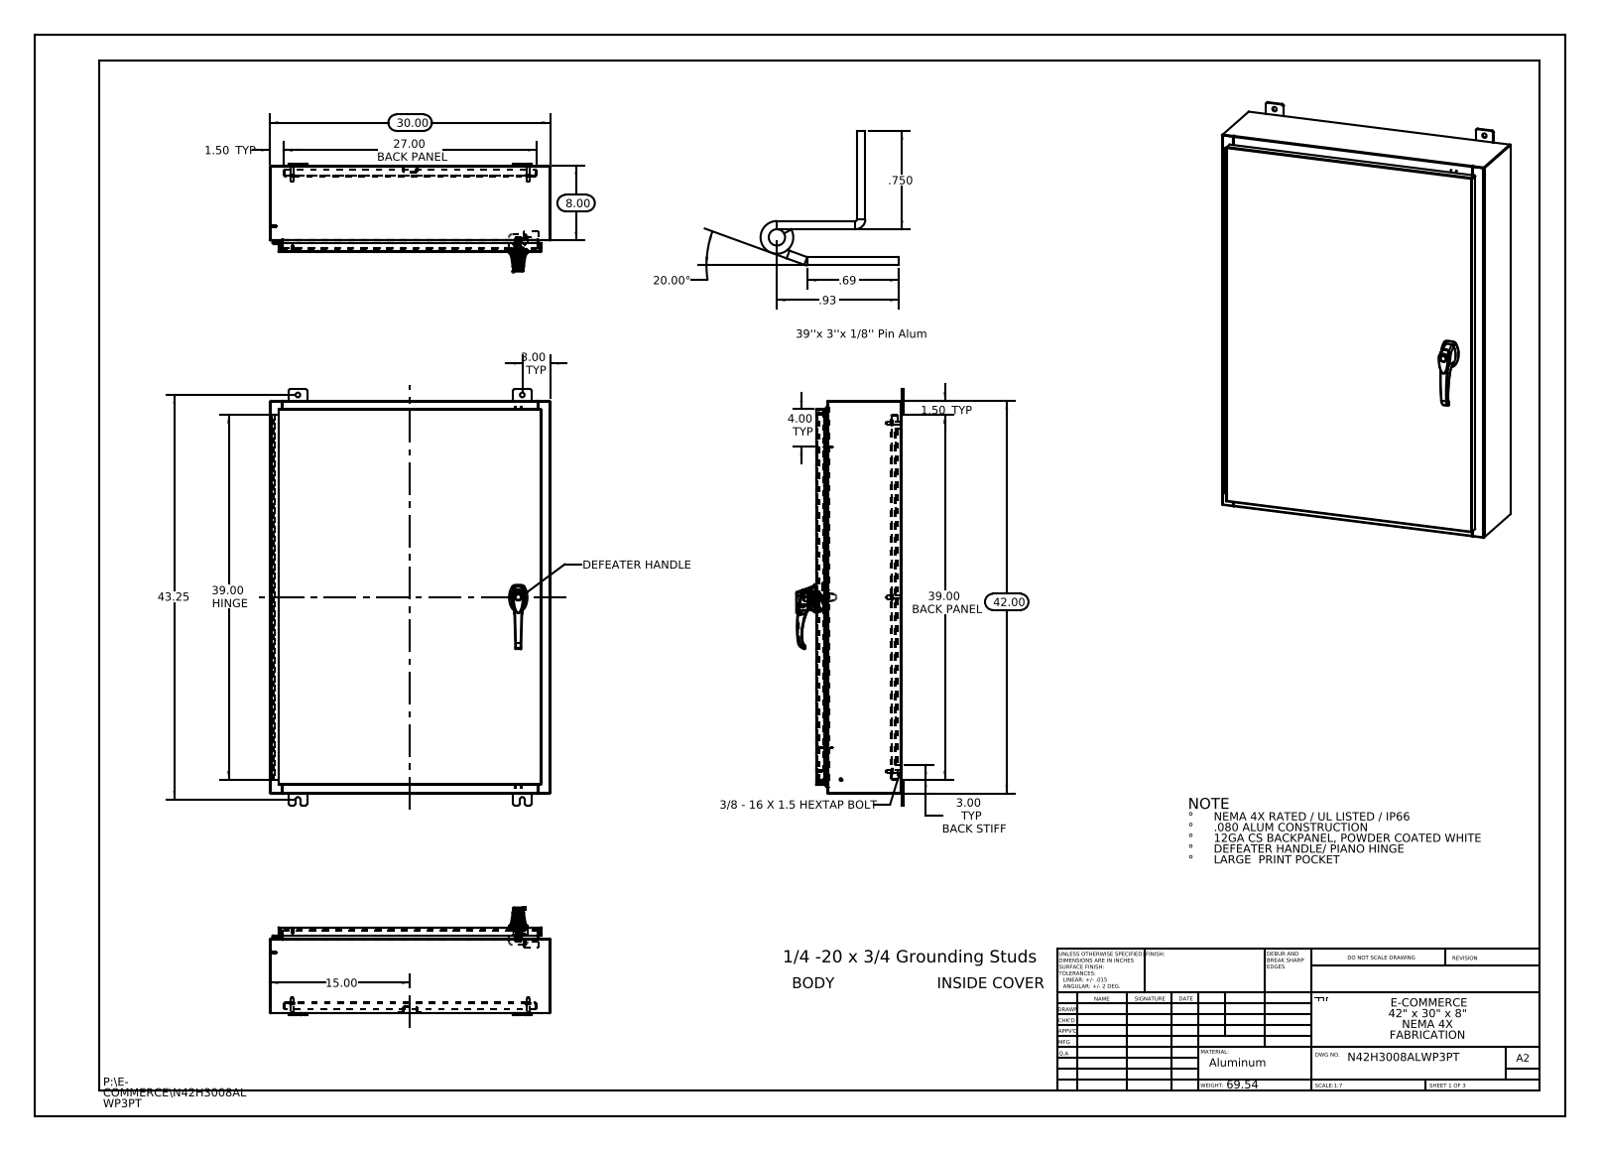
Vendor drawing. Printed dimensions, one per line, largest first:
43.25
42.00
39.00 HINGE
39.00 BACK PANEL
30.00
27.00 BACK PANEL
20.00°
15.00
8.00
4.00 TYP
3.00 TYP
3.00 TYP BACK STIFF
1.50 TYP
1.50 TYP
.93
.750
.69
